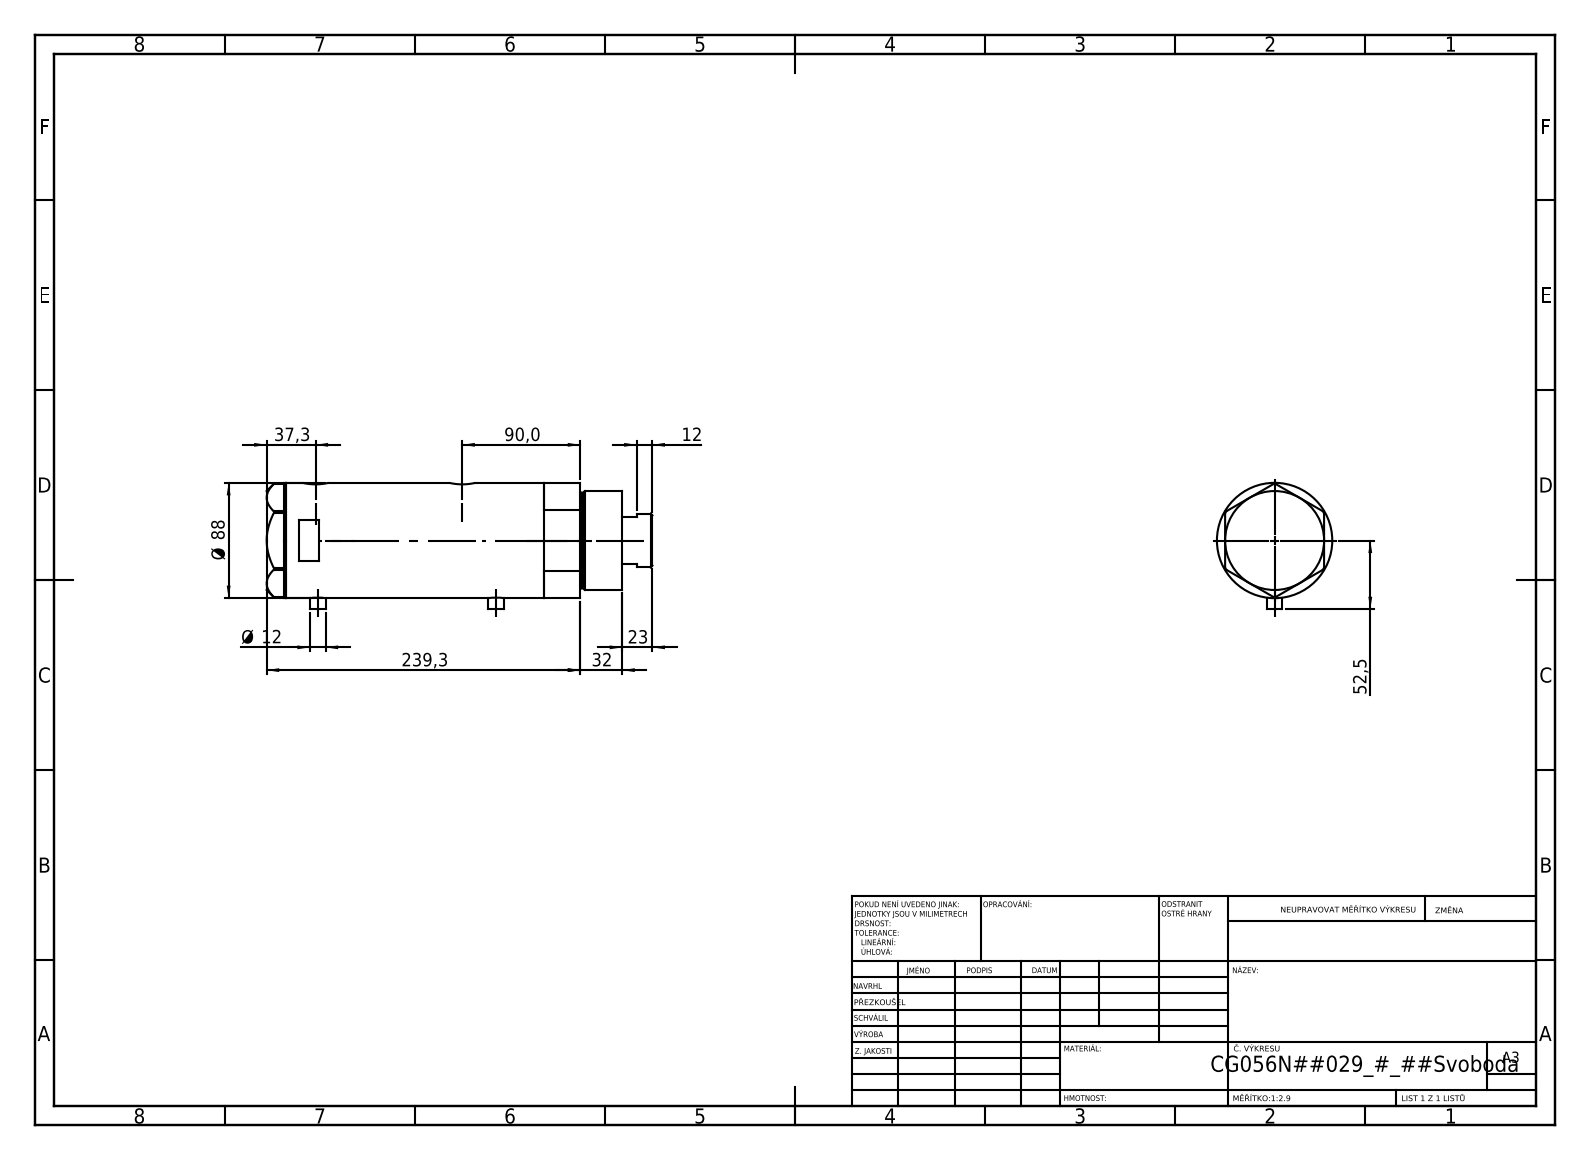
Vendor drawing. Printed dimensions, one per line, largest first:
239,3
90,0
Ø 88
52,5
37,3
32
23
12
Ø 12
